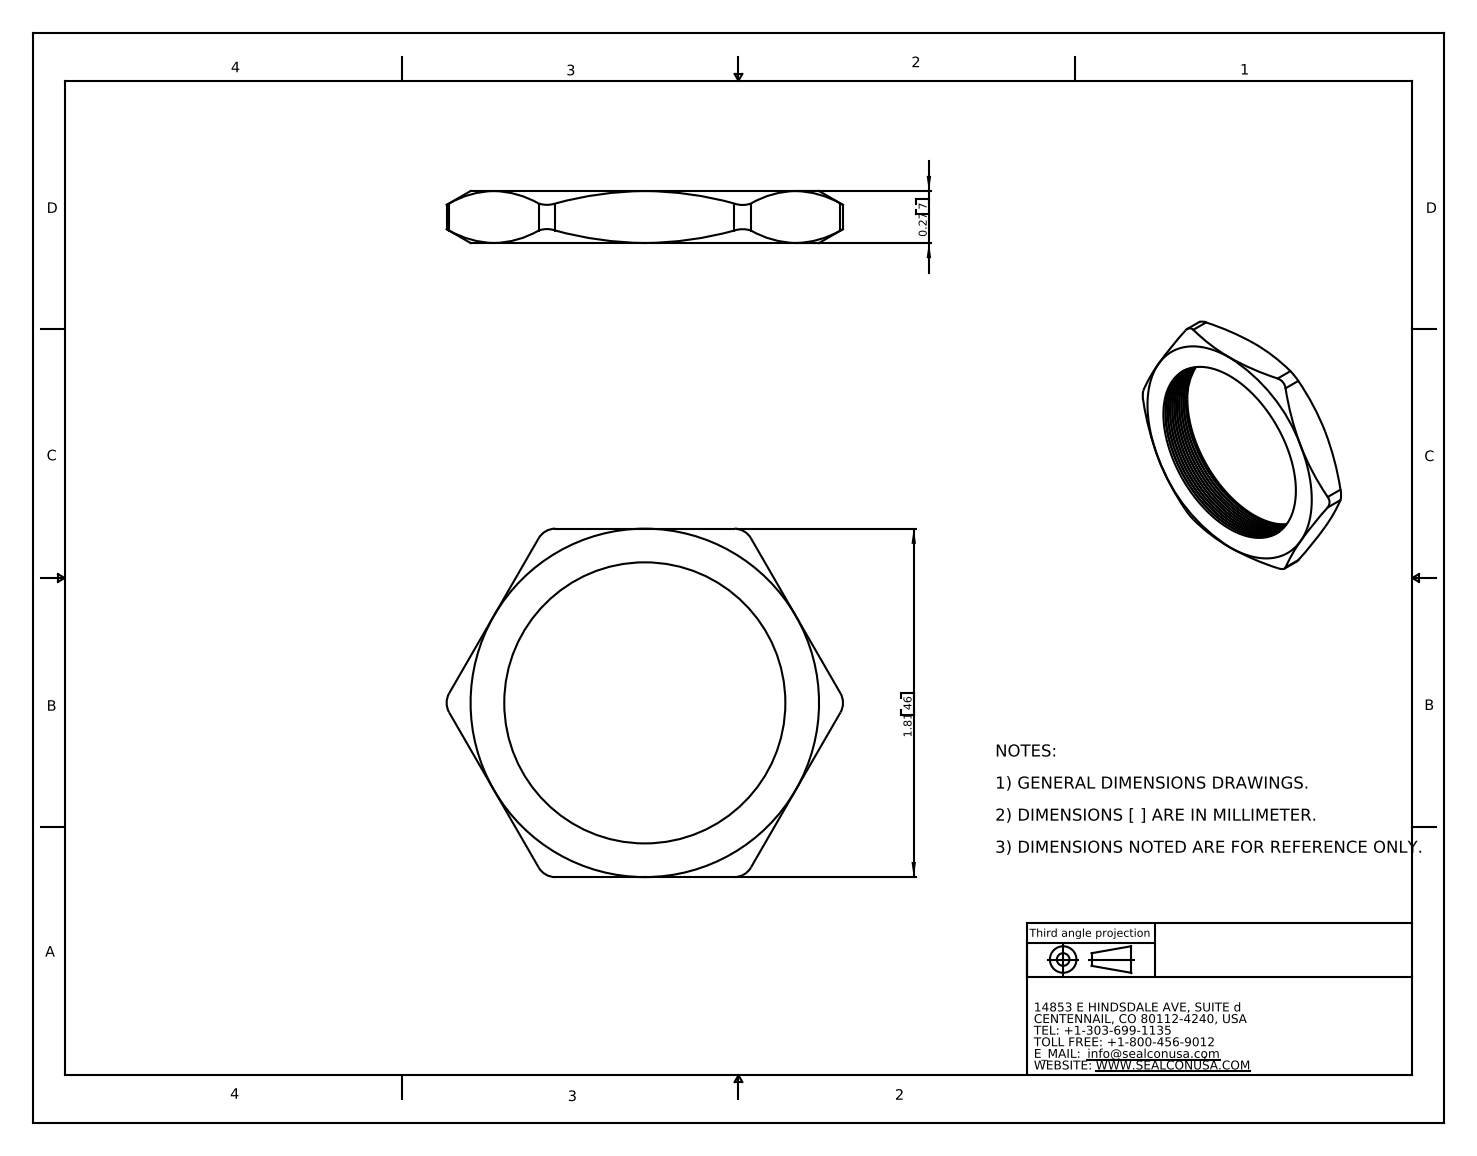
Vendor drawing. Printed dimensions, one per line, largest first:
1.81 46
0.27 7
